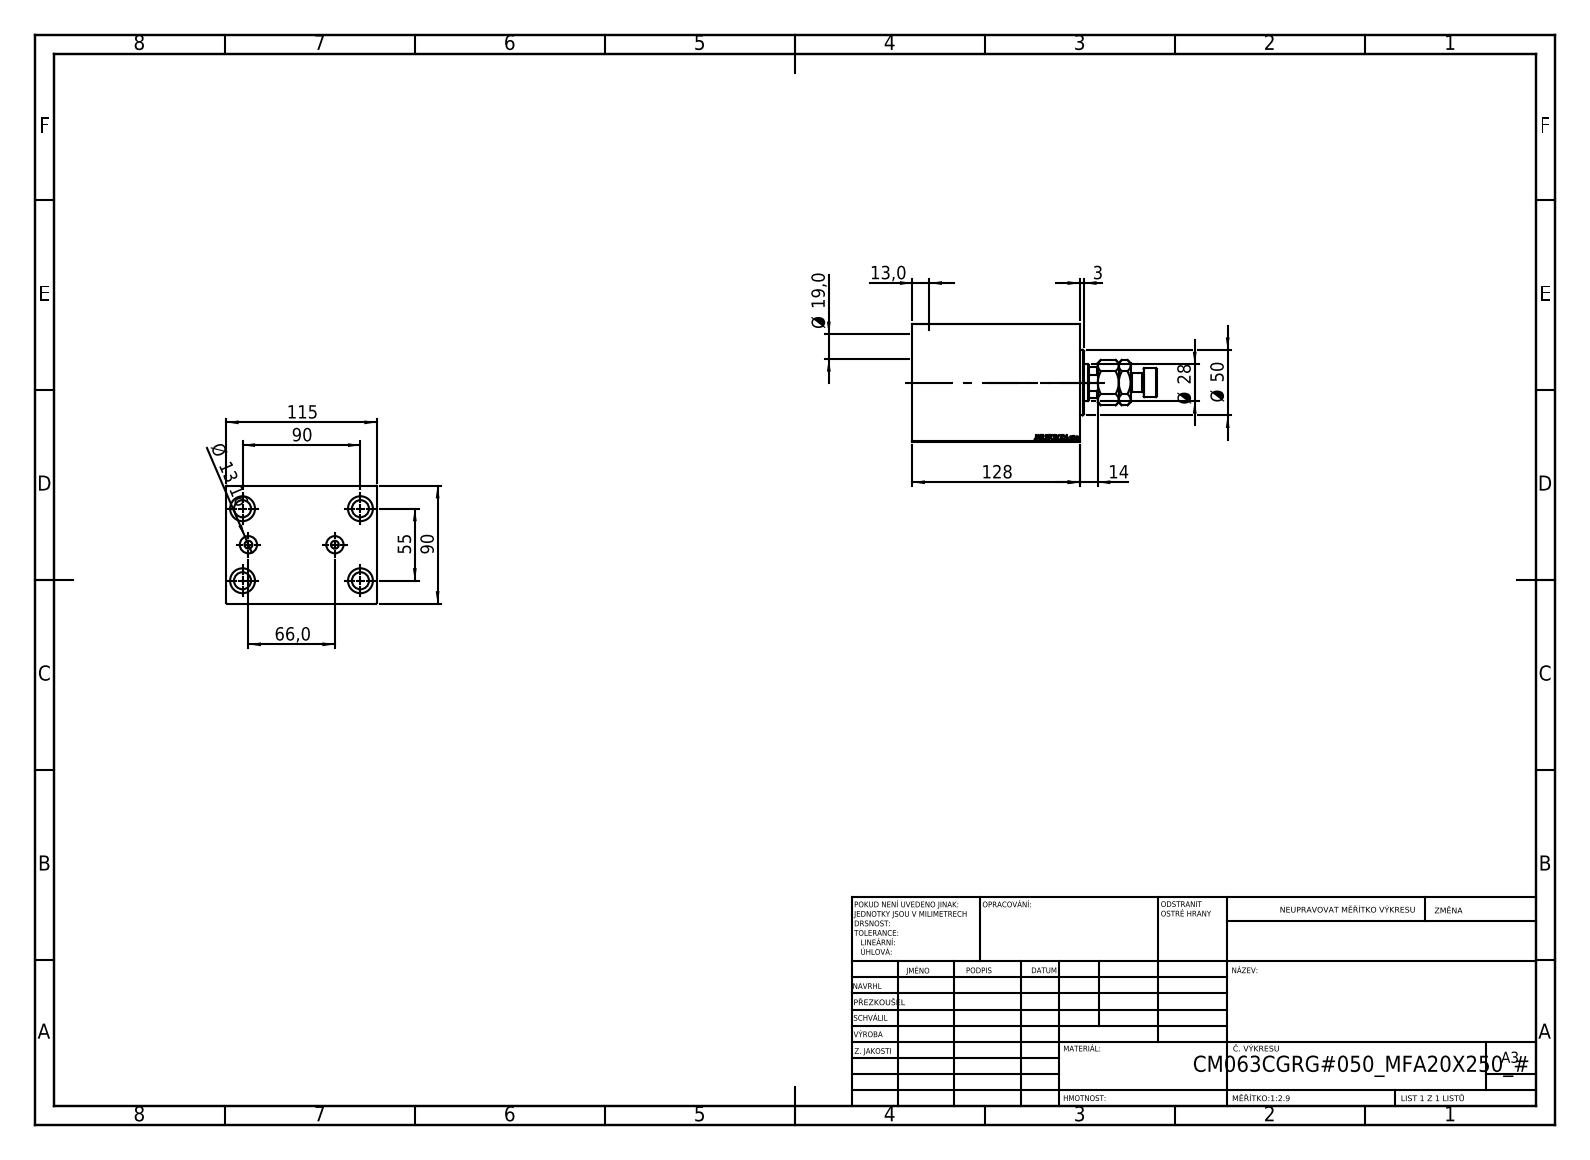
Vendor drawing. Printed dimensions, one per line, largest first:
128
115
90
90
66,0
55
Ø 50
Ø 28
Ø 19,0
14
Ø 13,16
13,0
3
